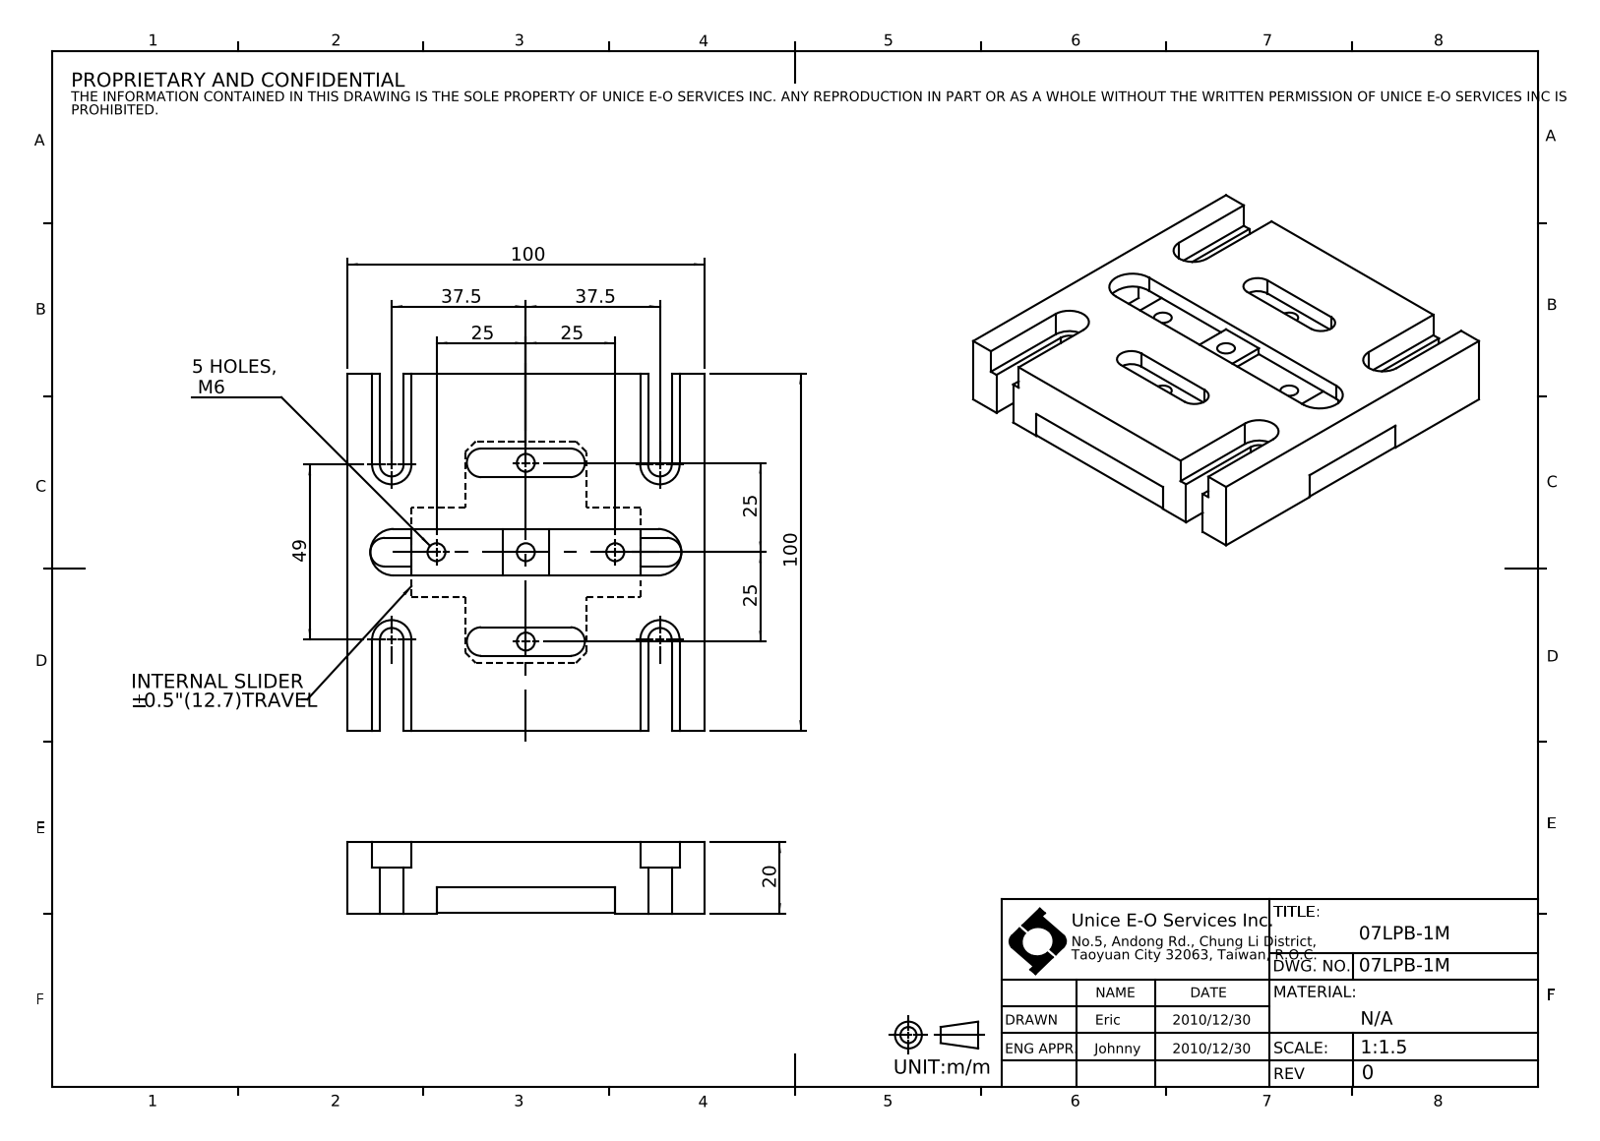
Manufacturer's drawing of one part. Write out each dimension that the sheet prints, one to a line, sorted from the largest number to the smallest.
100
100
49
37.5
37.5
25
25
25
25
20
5 HOLES, M6
